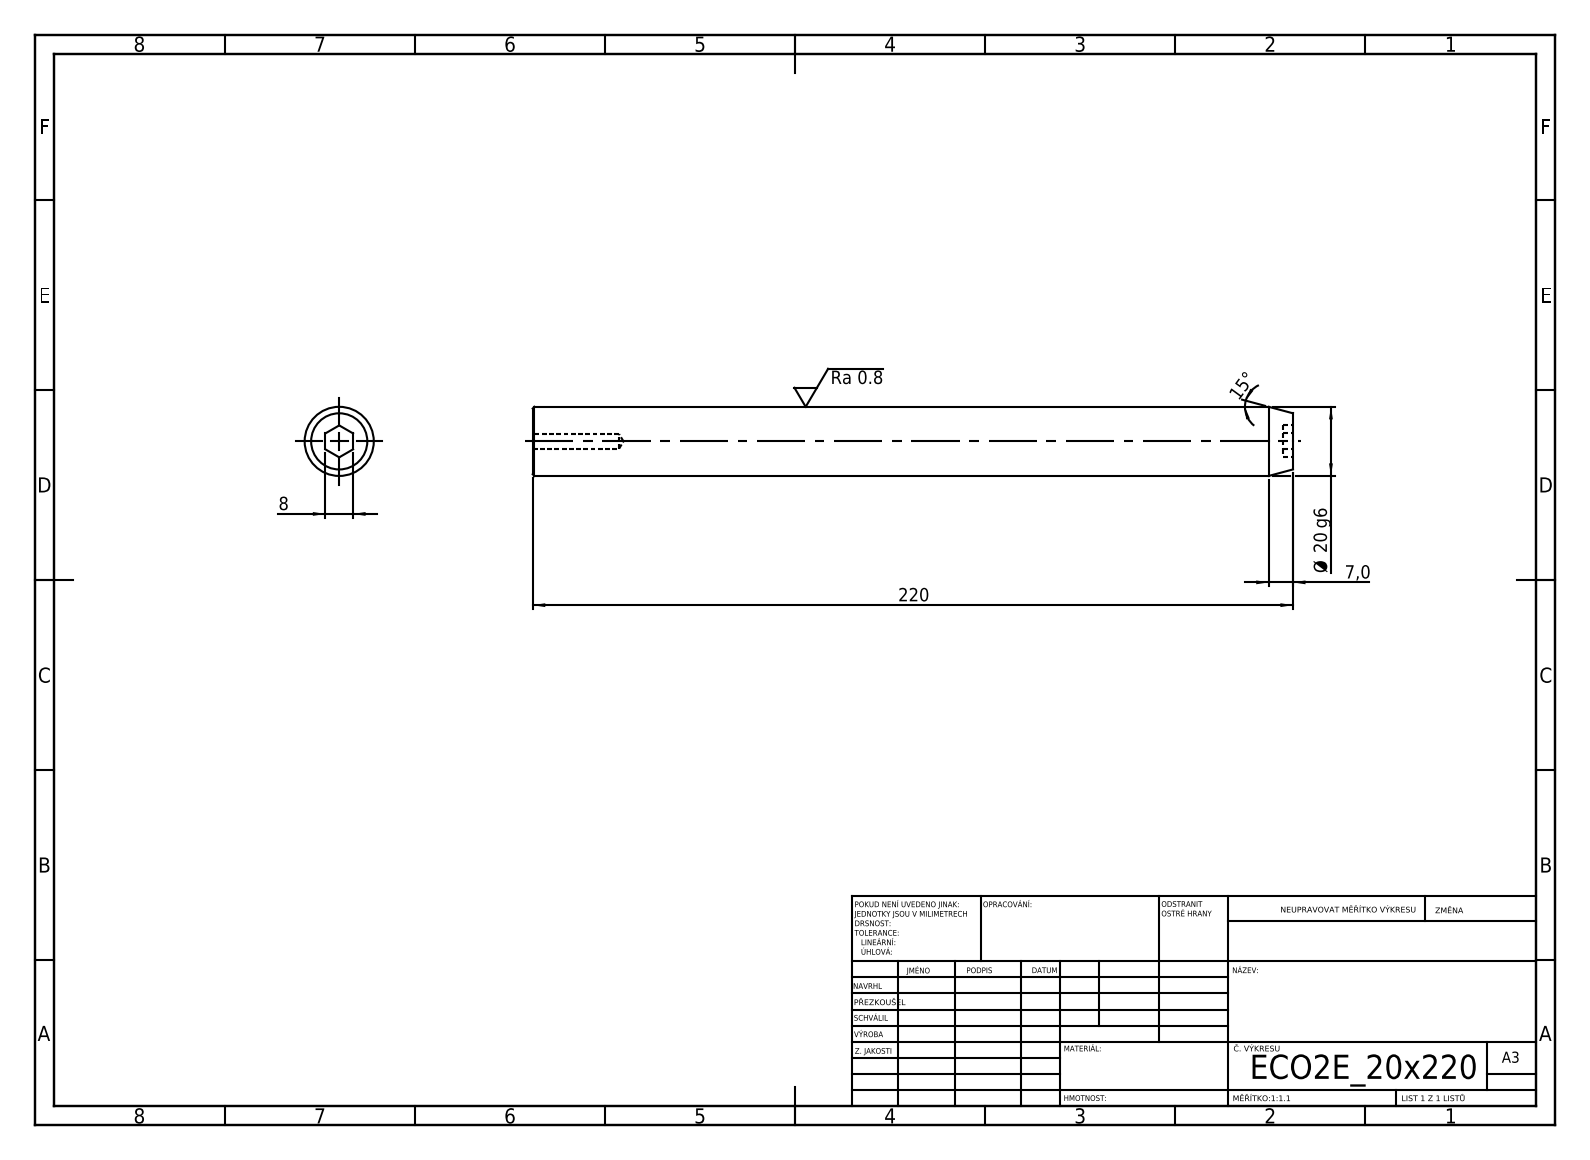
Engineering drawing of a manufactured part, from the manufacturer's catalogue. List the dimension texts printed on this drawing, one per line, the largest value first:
220
Ø 20 g6
15°
8
7,0
